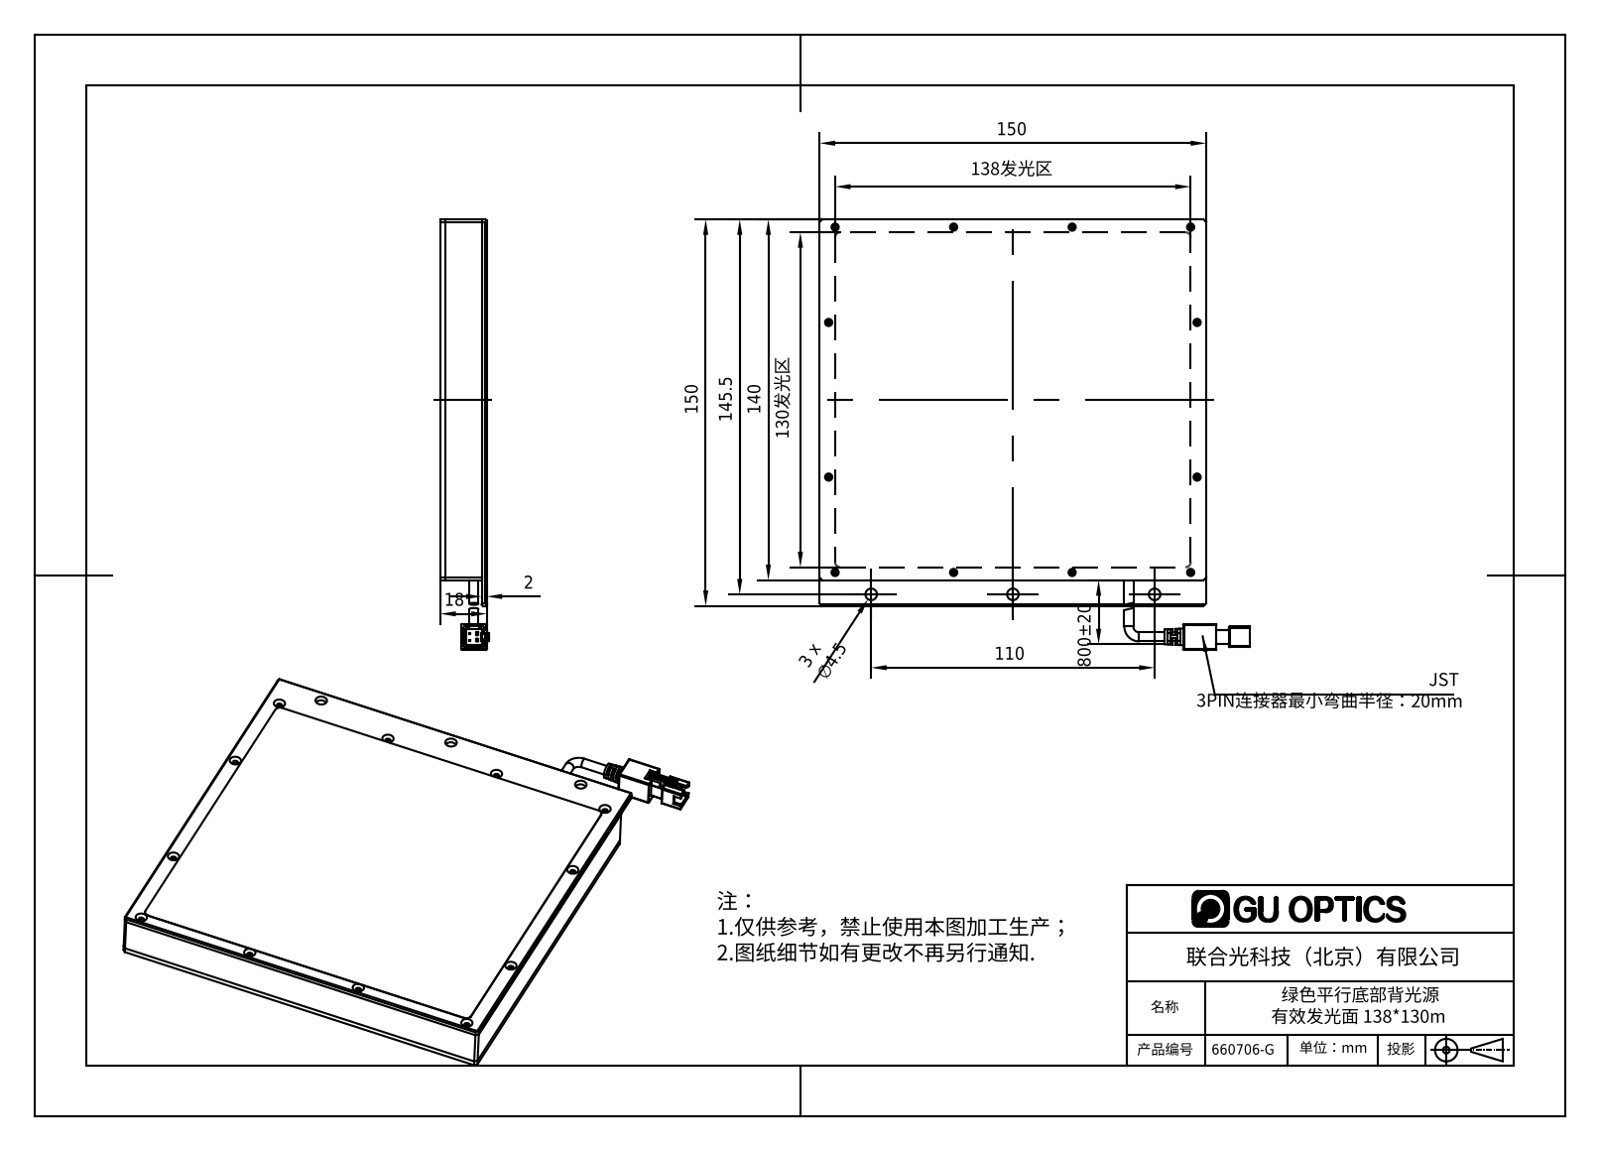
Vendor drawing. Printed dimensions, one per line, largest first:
800±20
150
150
145.5
140
138发光区
130发光区
110
18
3 x ∅4.5
2
